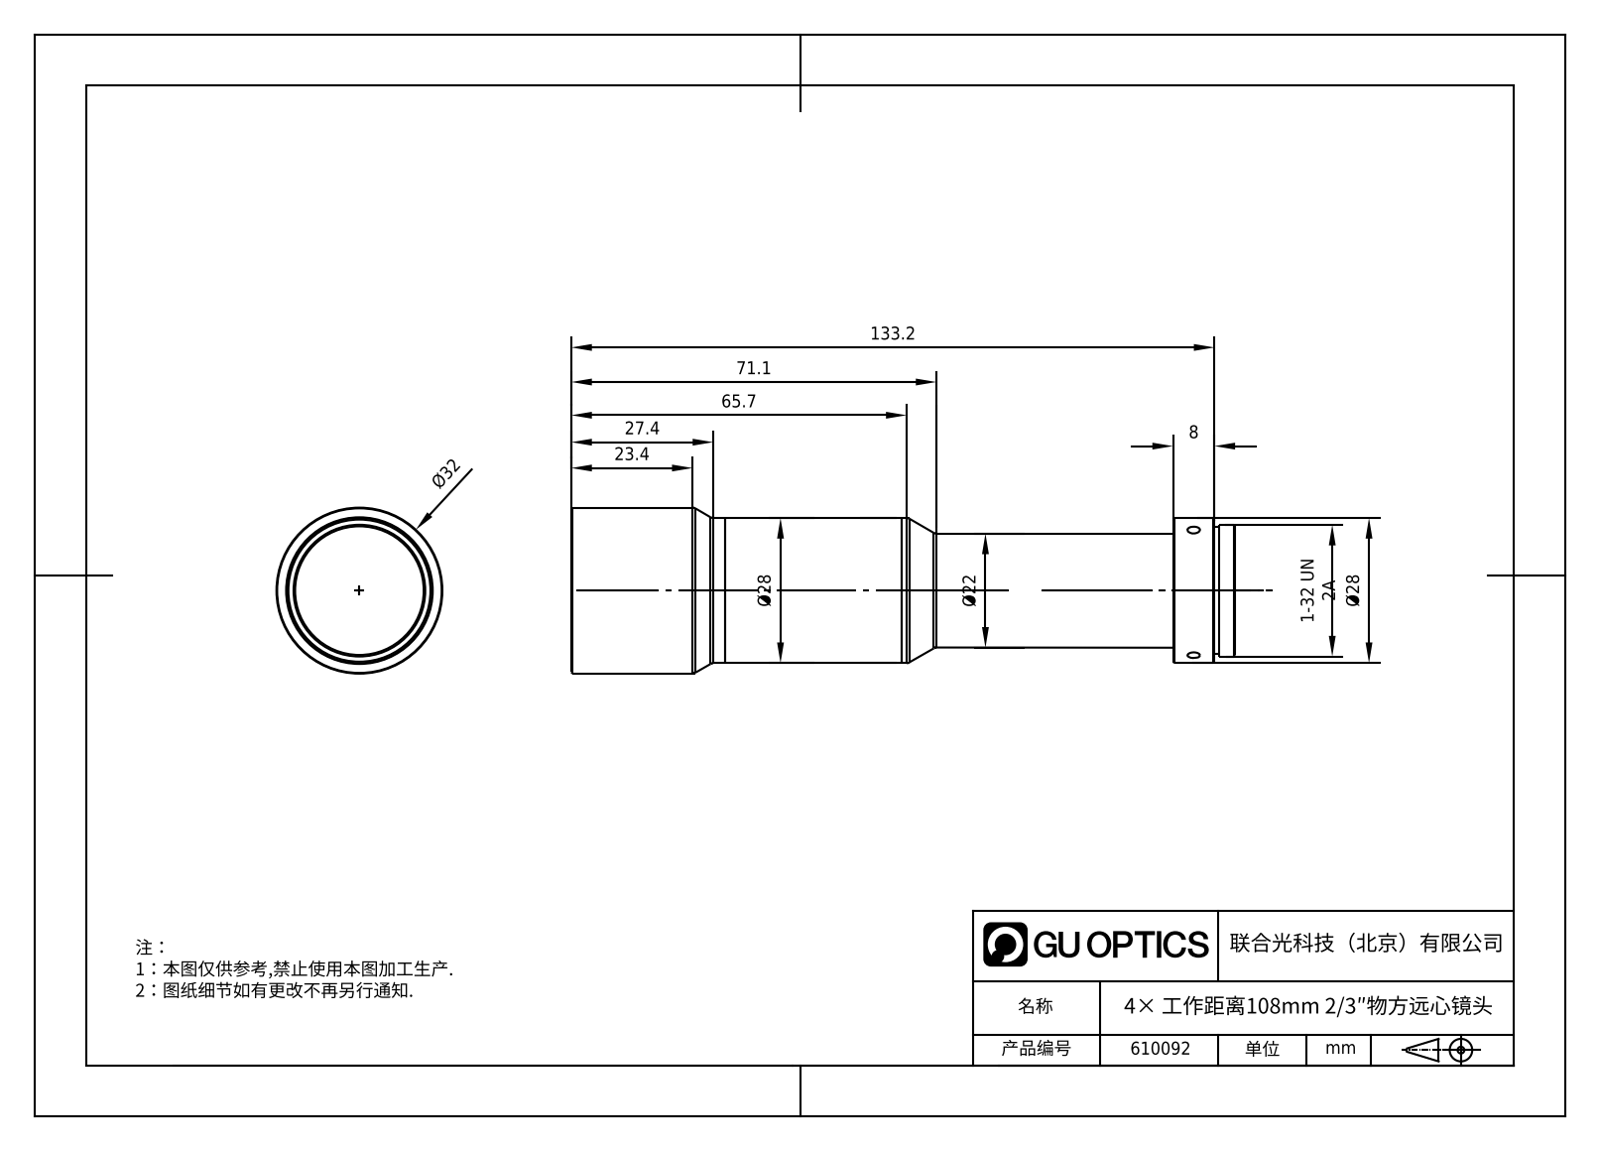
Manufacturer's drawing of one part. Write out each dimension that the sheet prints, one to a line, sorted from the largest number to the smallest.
133.2
71.1
65.7
Ø32
Ø28
Ø28
27.4
23.4
Ø22
8
1-32 UN 2A
